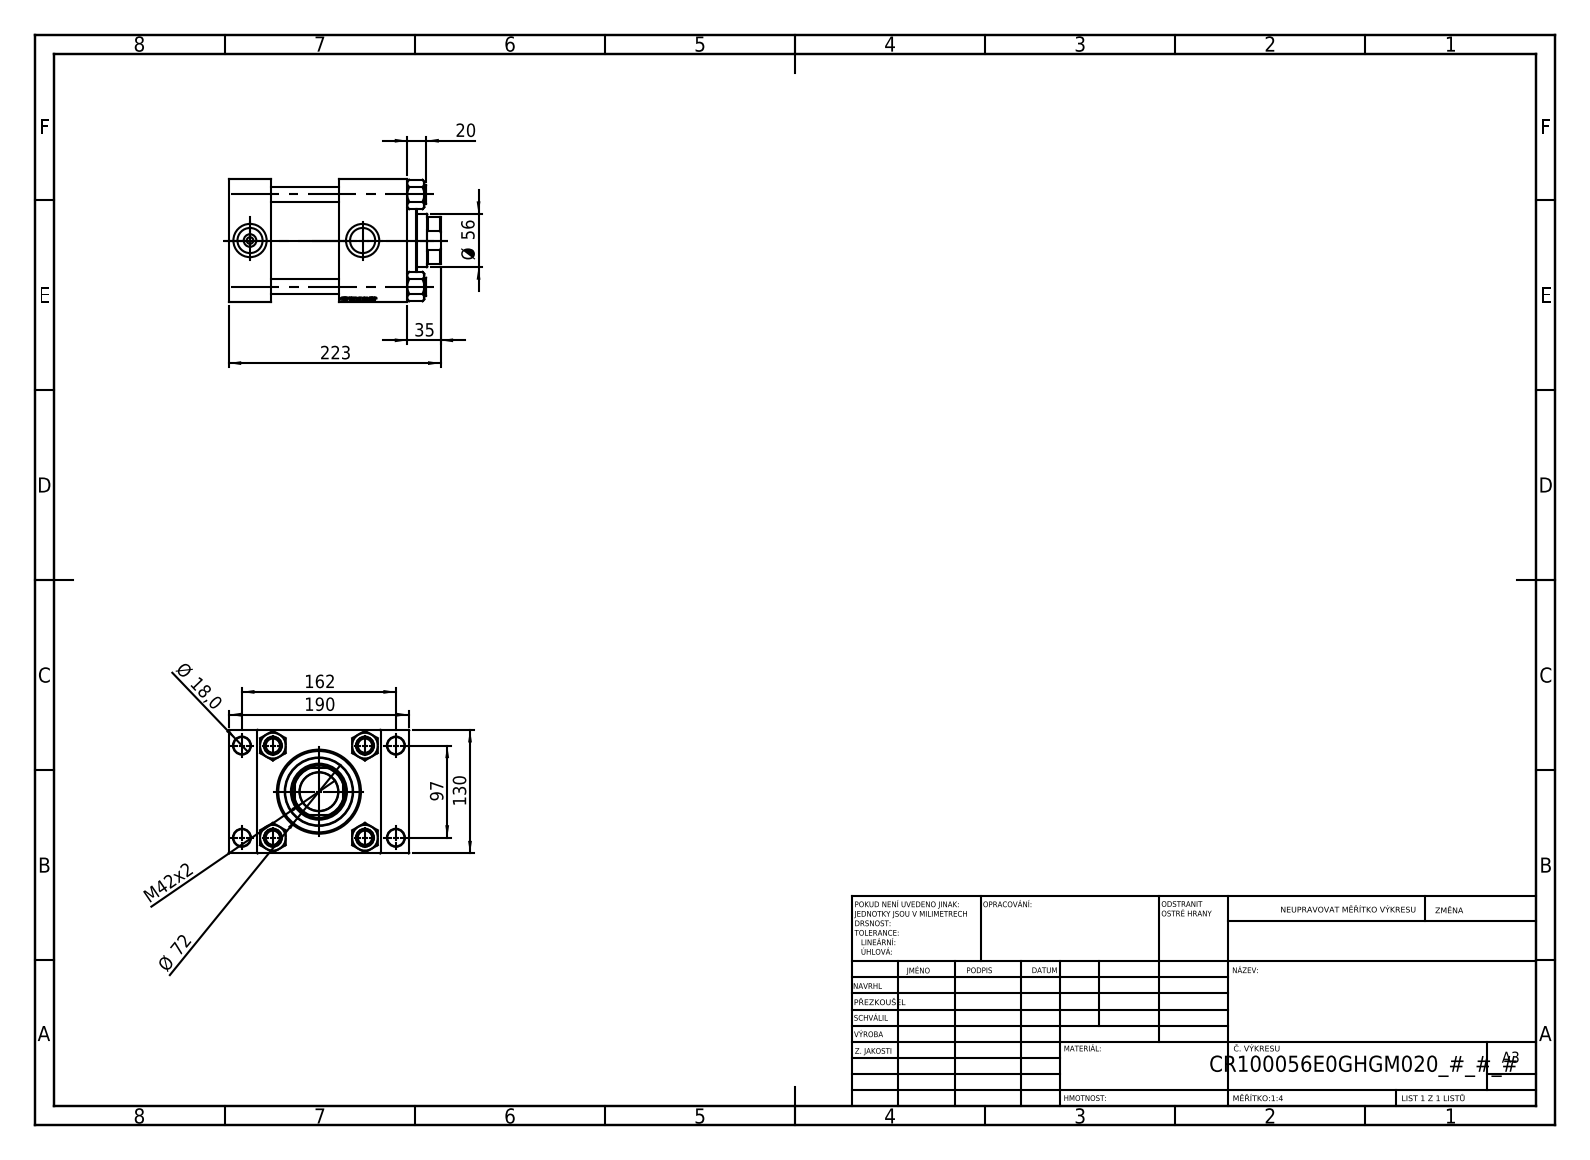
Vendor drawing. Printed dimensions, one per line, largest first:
223
190
162
130
97
Ø 72
Ø 56
M42x2
35
20
Ø 18,0
